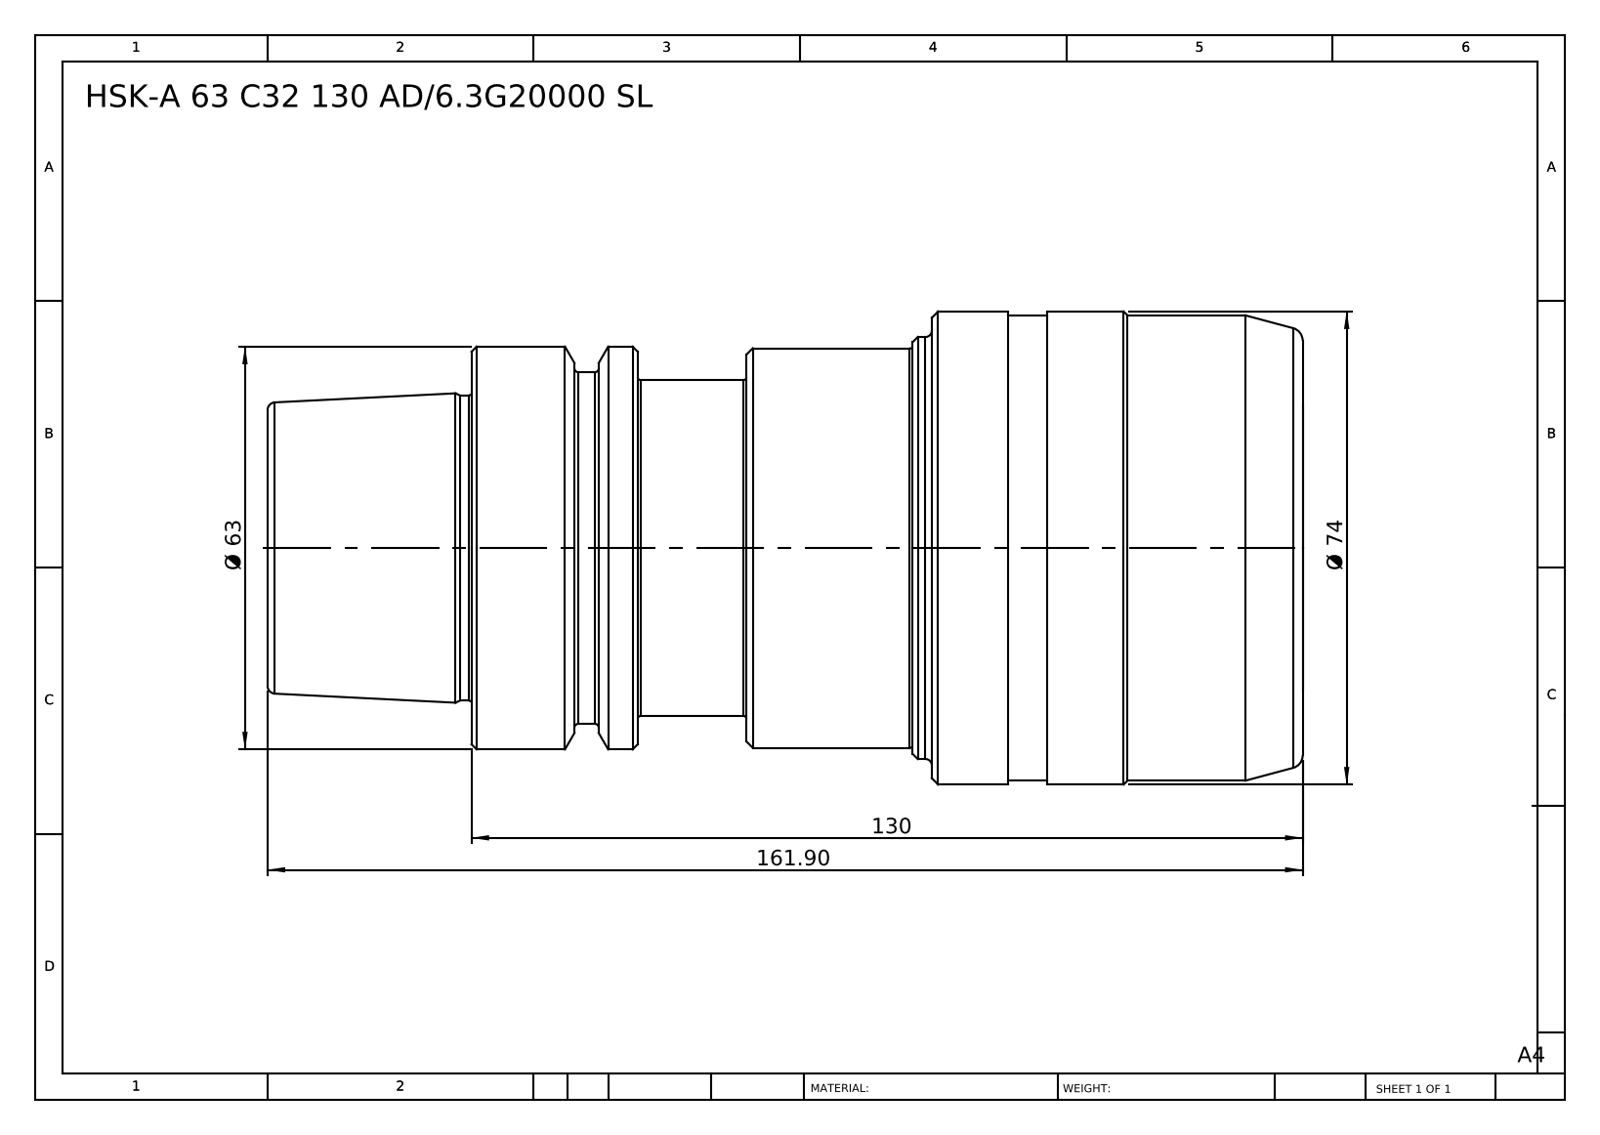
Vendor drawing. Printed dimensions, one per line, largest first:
161.90
130
Ø 74
Ø 63
